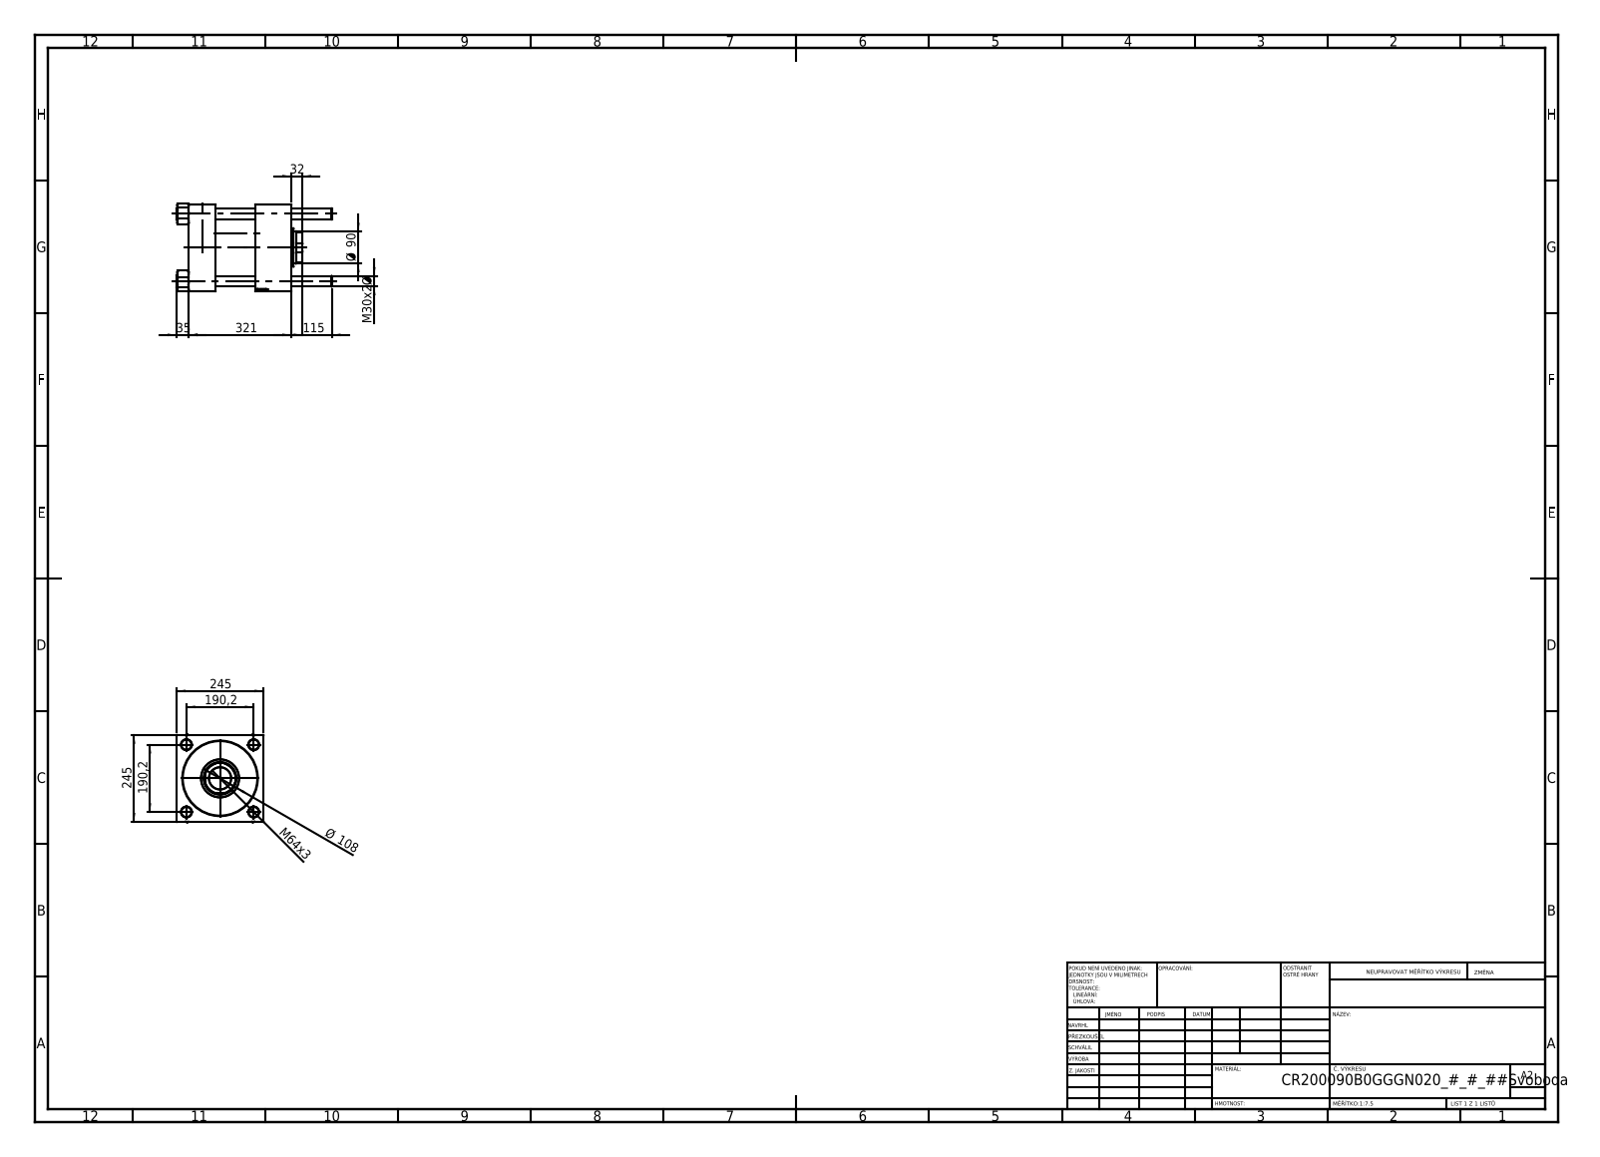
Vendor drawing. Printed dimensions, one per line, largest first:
321
245
245
190,2
190,2
115
Ø 108
Ø 90
M64x3
35
32
M30x2 Ø
